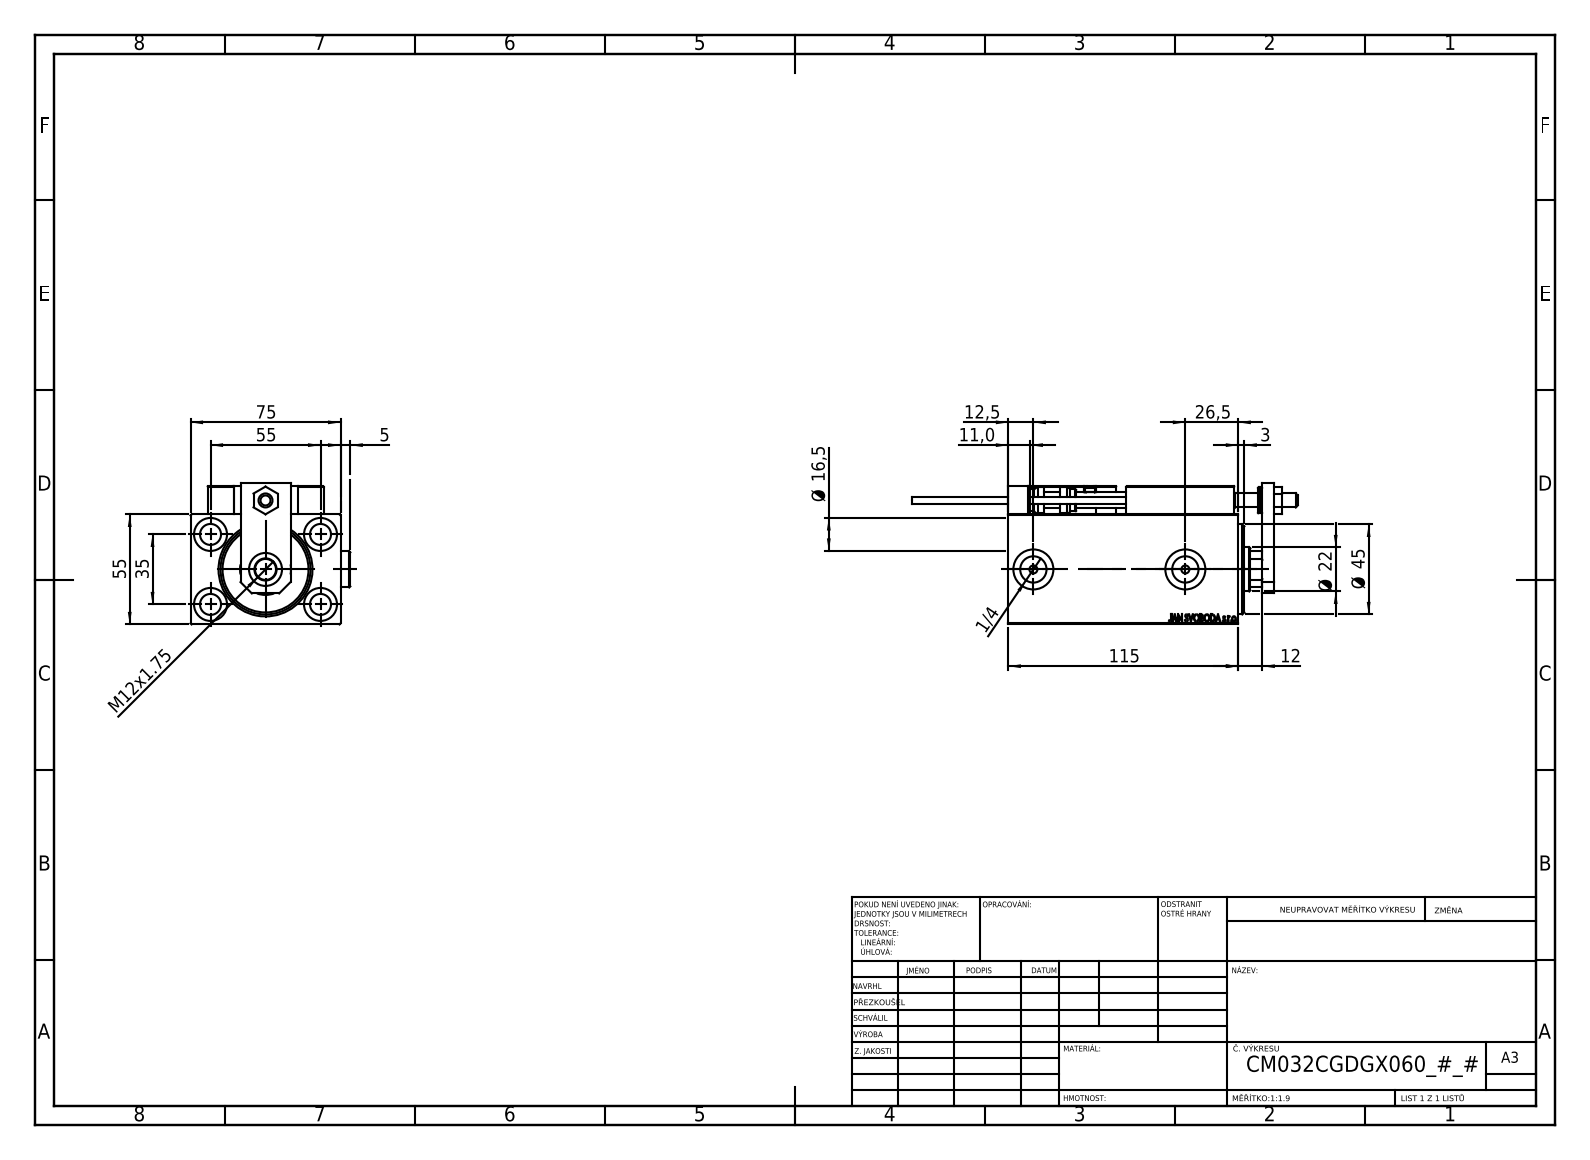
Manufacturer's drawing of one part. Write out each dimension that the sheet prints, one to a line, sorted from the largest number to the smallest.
115
75
55
55
Ø 45
35
26,5
Ø 22
Ø 16,5
12,5
M12x1.75
12
11,0
5
3
1/4
